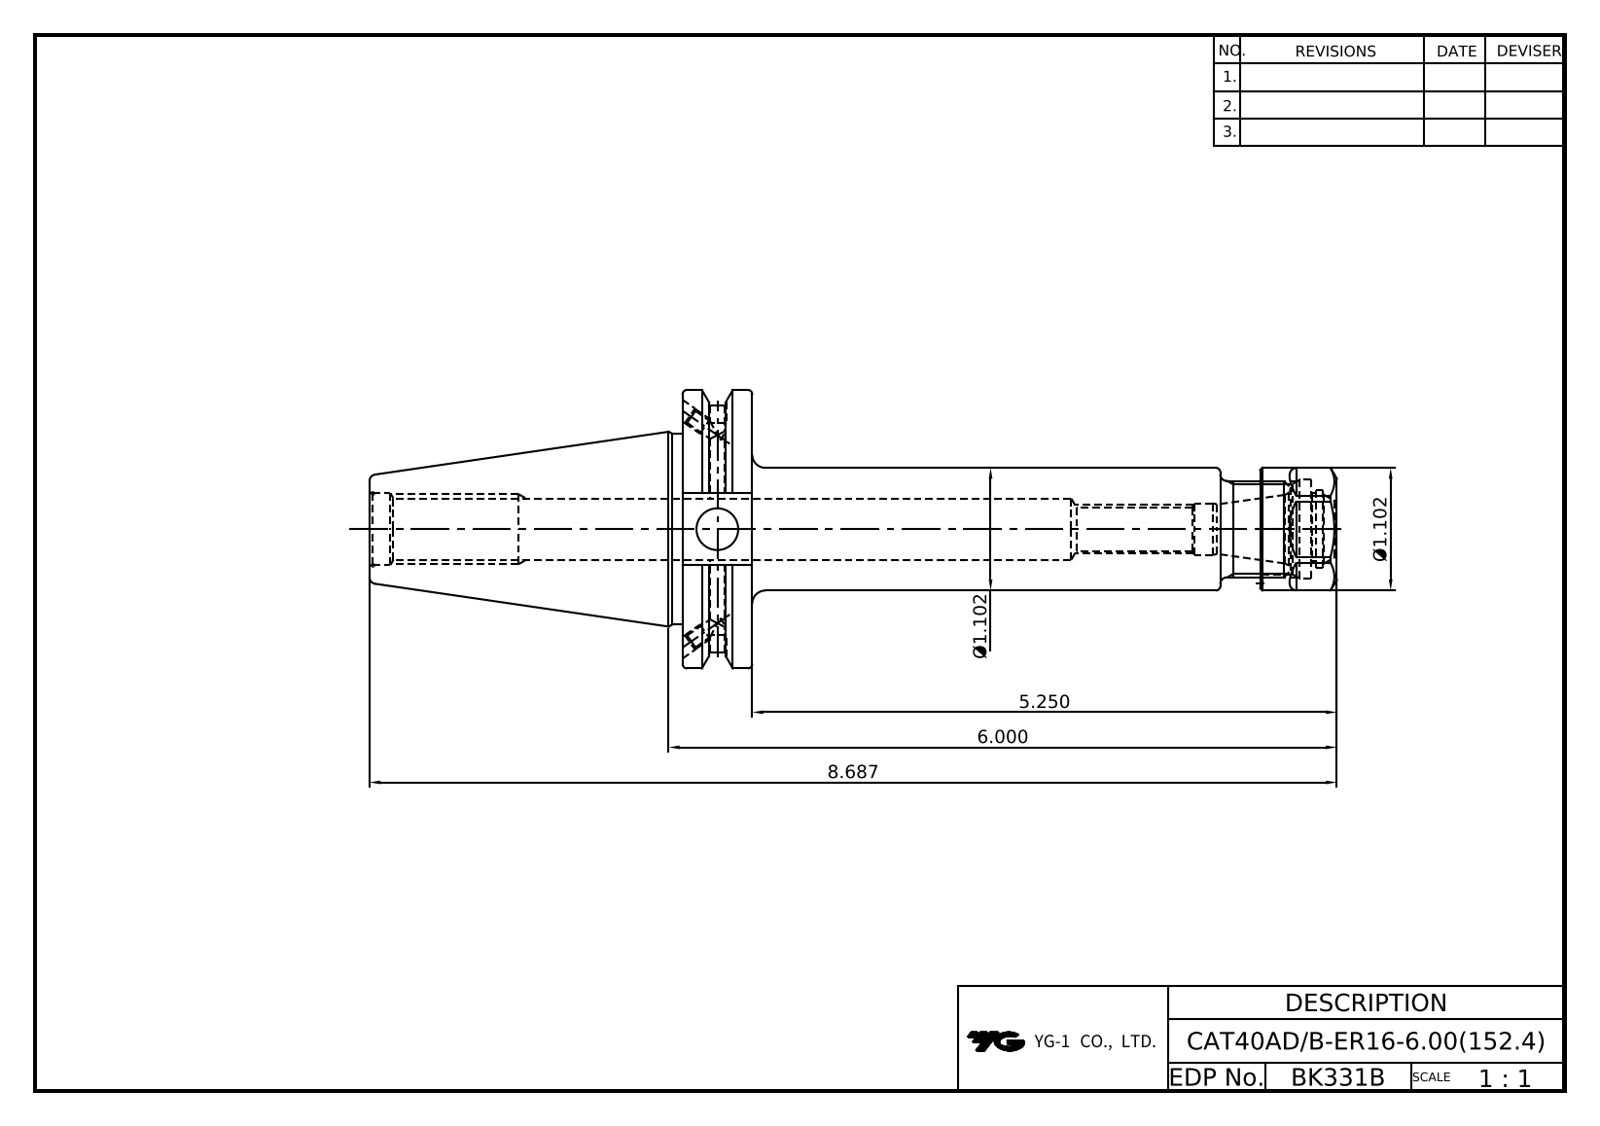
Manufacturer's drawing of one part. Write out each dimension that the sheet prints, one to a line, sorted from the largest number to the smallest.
8.687
6.000
5.250
Ø1.102
Ø1.102
